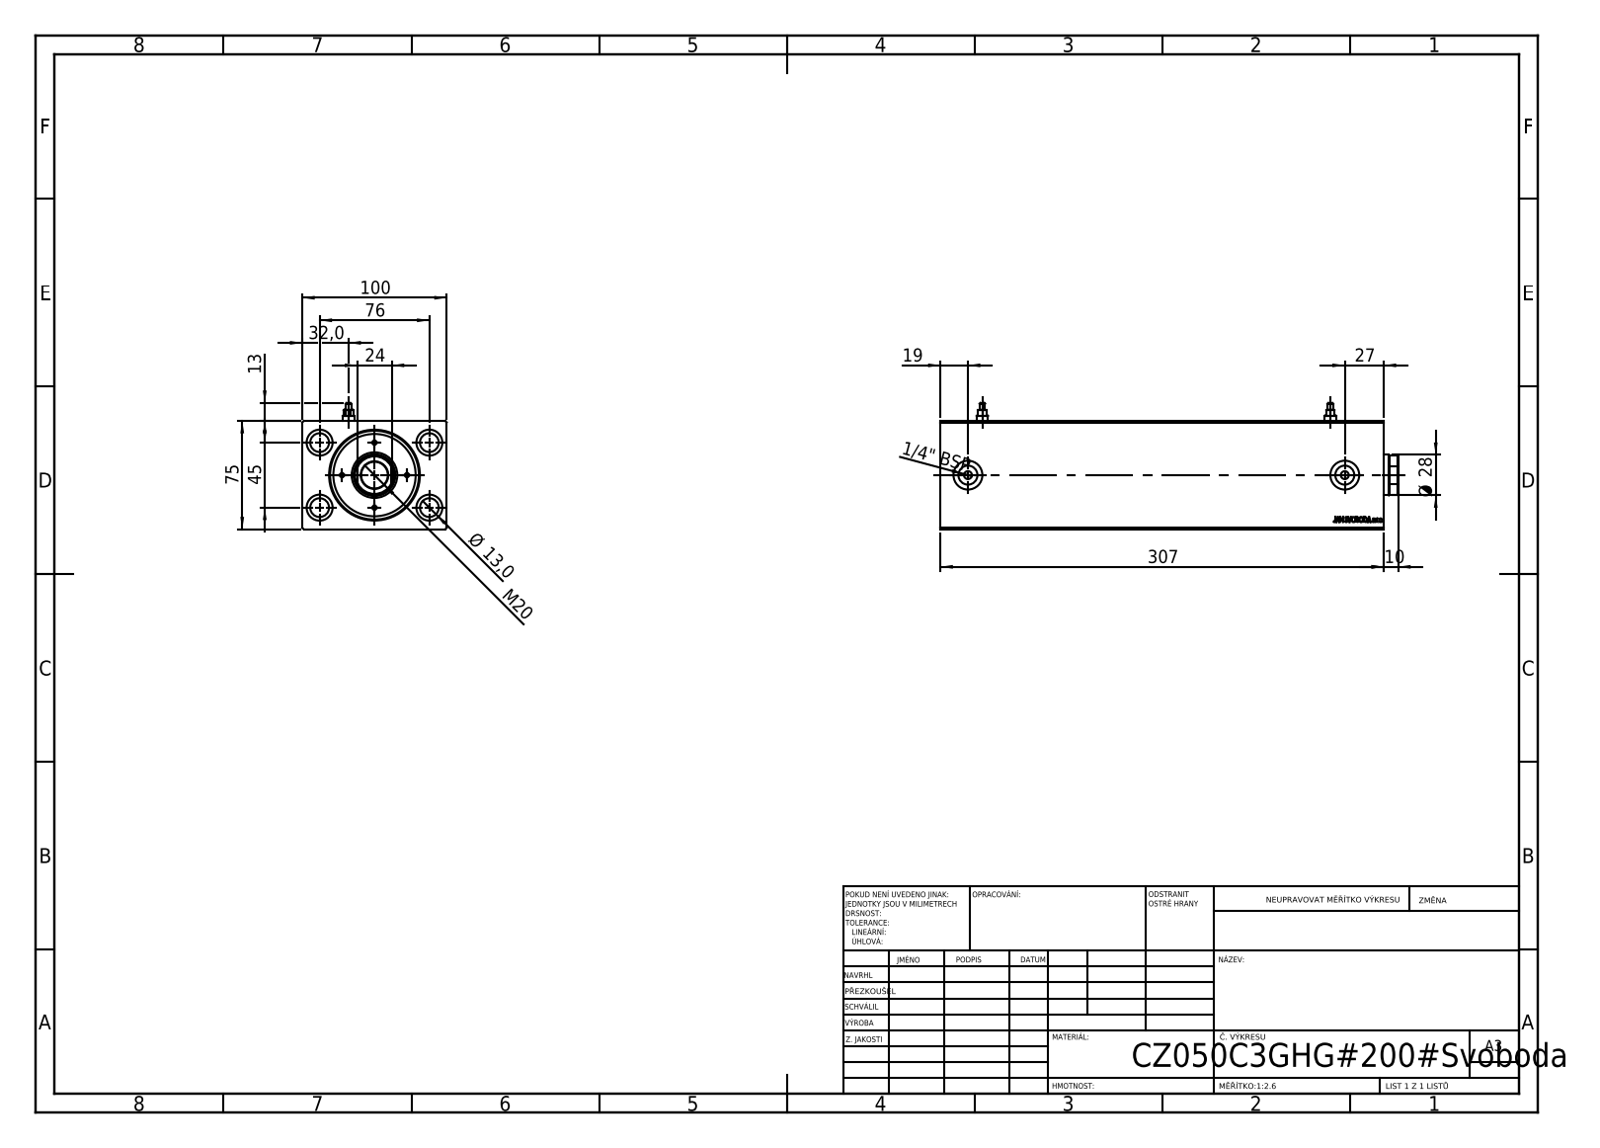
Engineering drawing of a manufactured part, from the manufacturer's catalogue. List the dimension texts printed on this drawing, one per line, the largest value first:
307
100
76
75
45
32,0
Ø 28
27
24
M20
19
Ø 13,0
13
10
1/4" BSP
